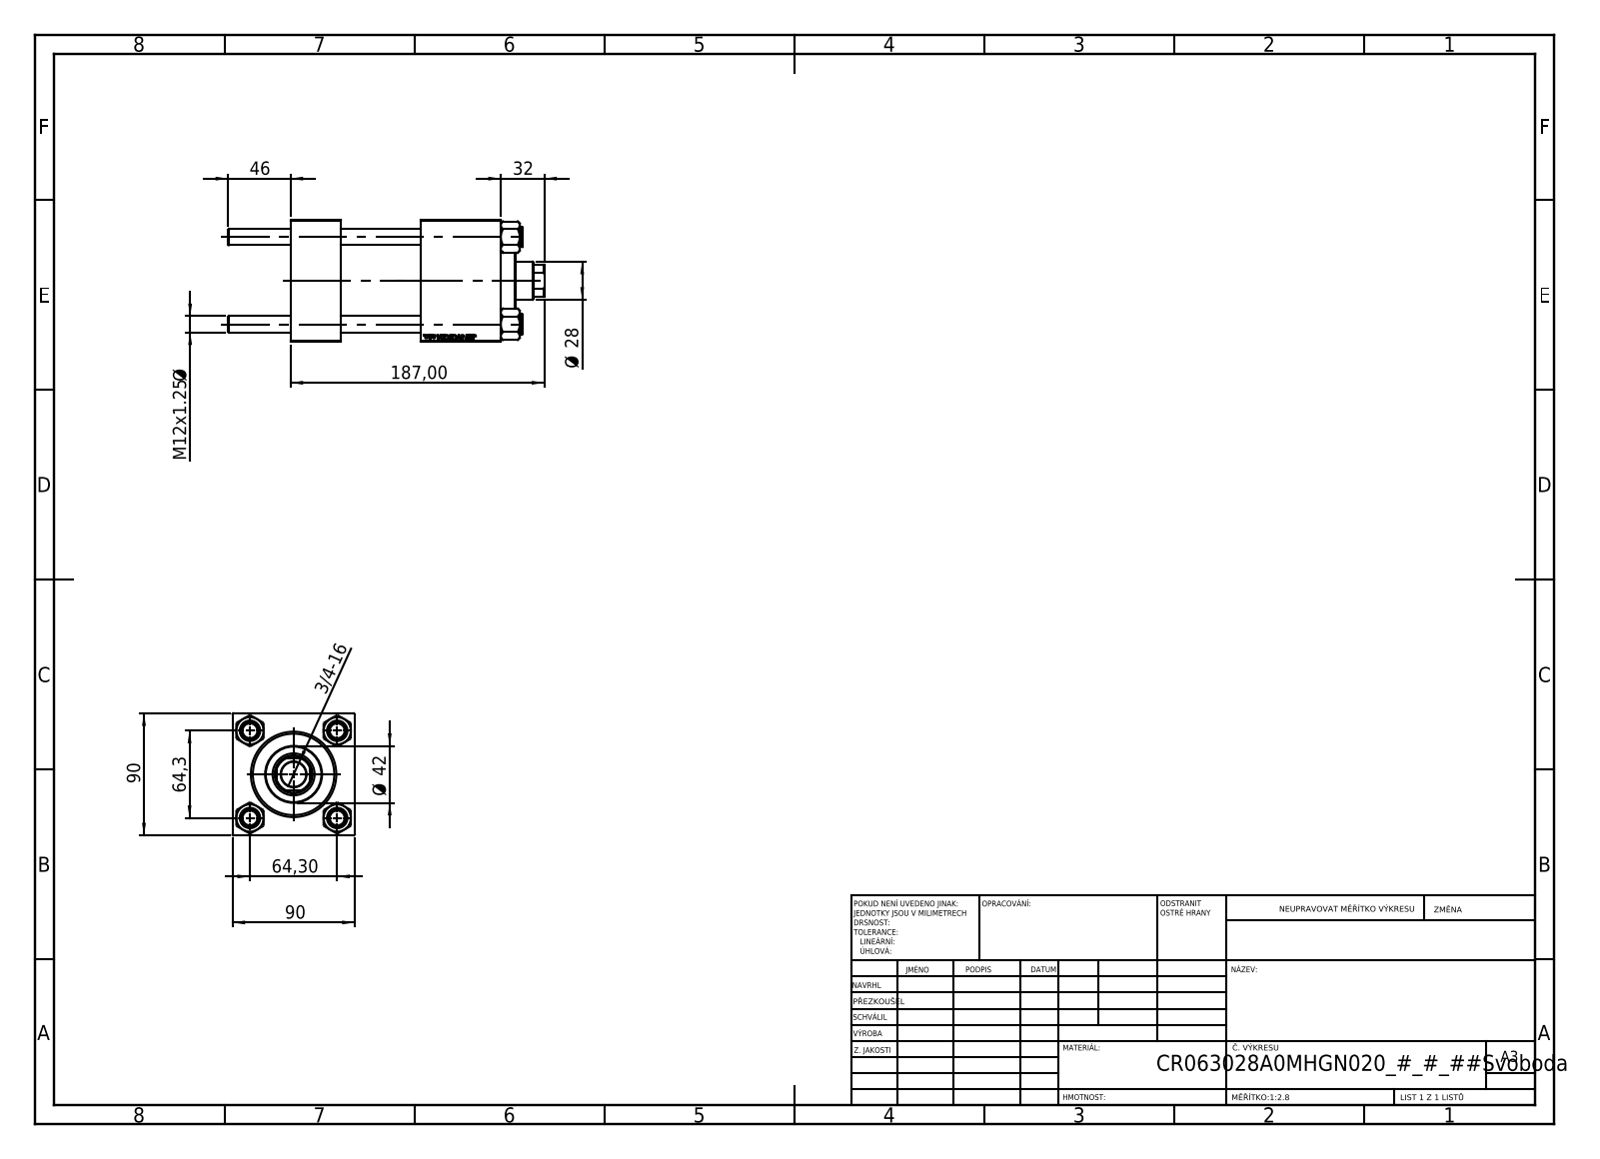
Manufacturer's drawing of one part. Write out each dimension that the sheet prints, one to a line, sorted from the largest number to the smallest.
187,00
90
90
64,3
64,30
46
Ø 42
32
Ø 28
M12x1.25 Ø
3/4-16
